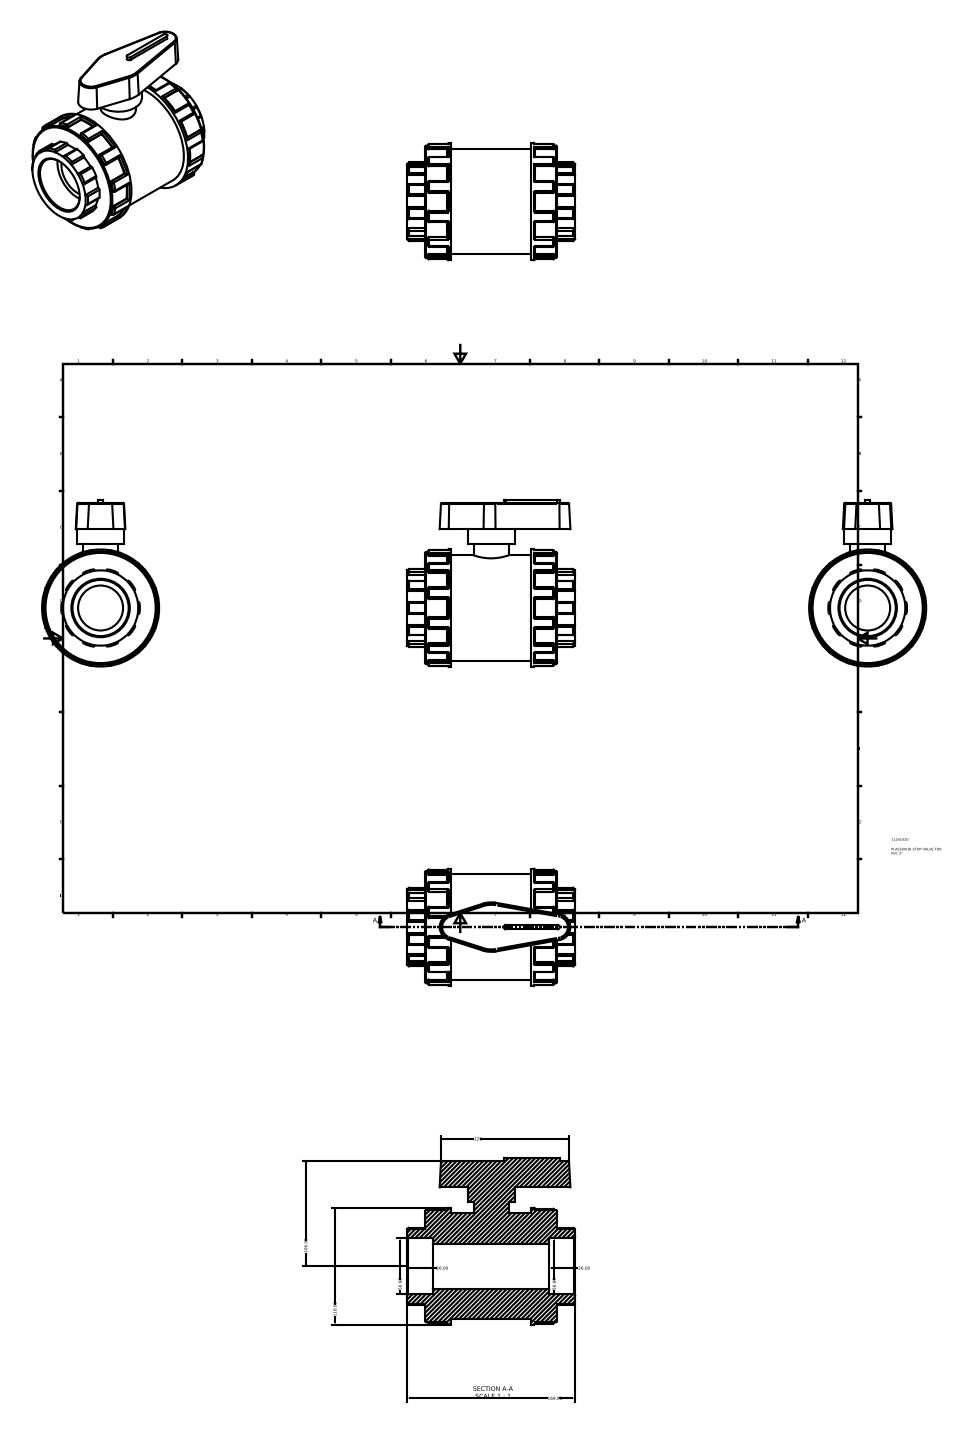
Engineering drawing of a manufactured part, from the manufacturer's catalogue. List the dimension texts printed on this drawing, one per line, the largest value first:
169.00
129
118.00
106.00
56.66
56.66
26.00
26.00
